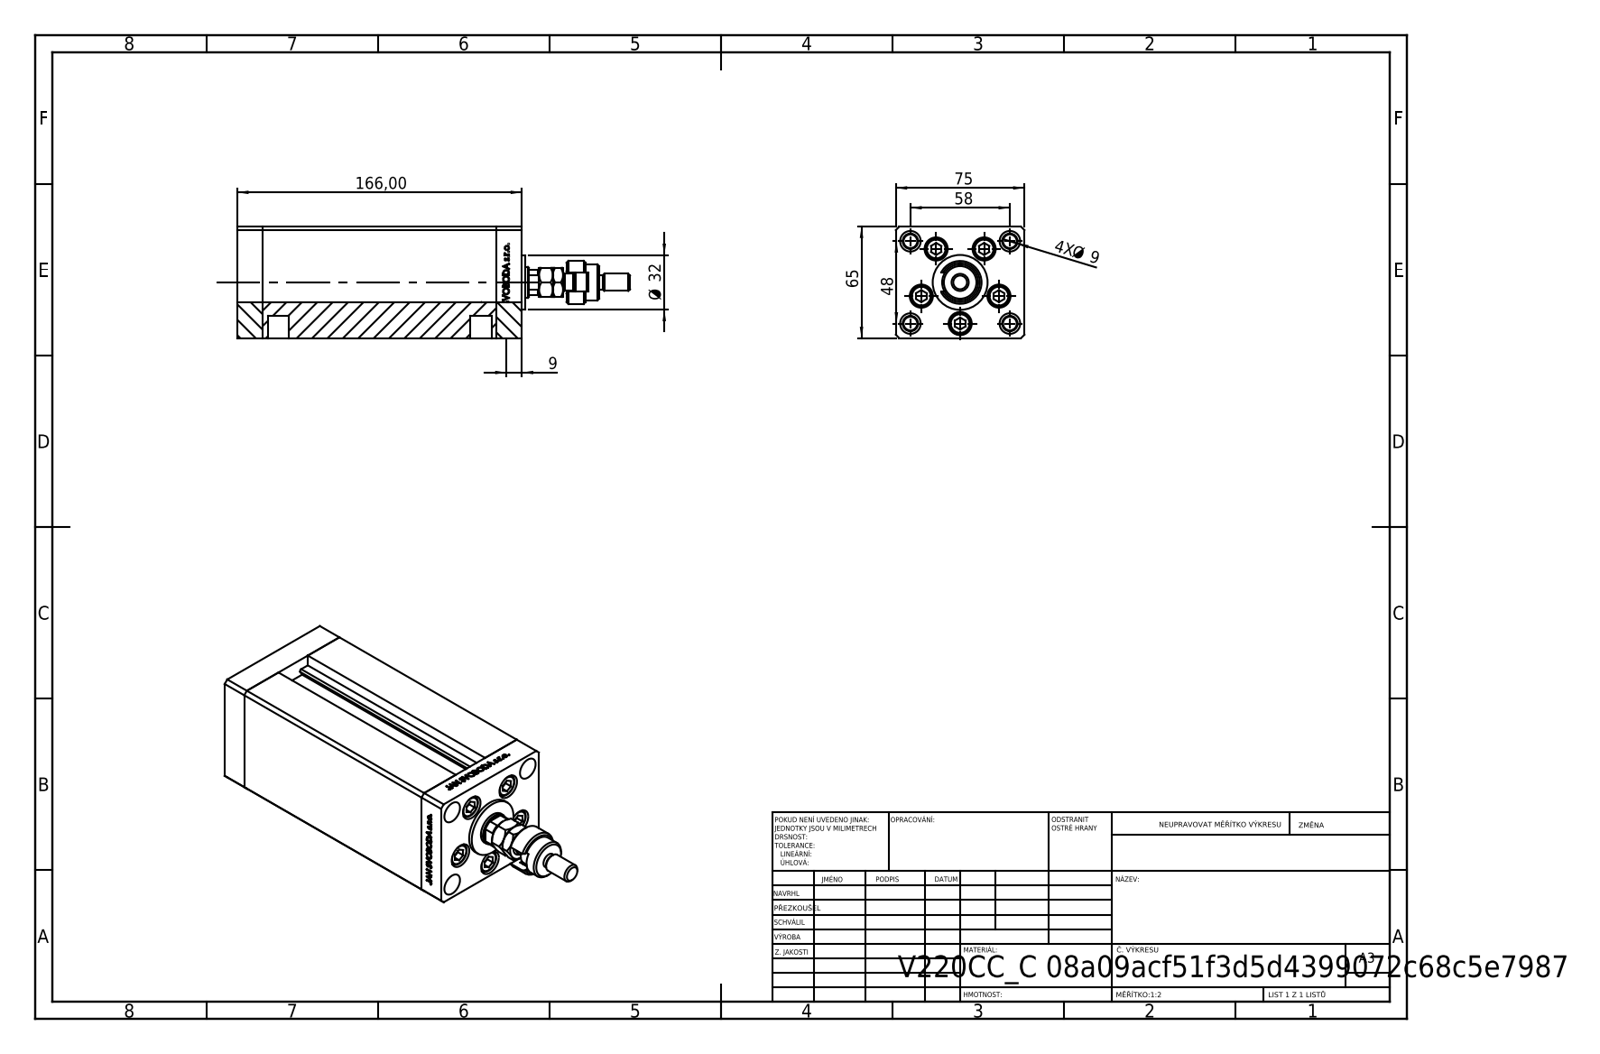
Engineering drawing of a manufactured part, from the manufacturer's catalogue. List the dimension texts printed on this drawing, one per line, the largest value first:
166,00
75
65
58
48
Ø 32
9
4X Ø 9
